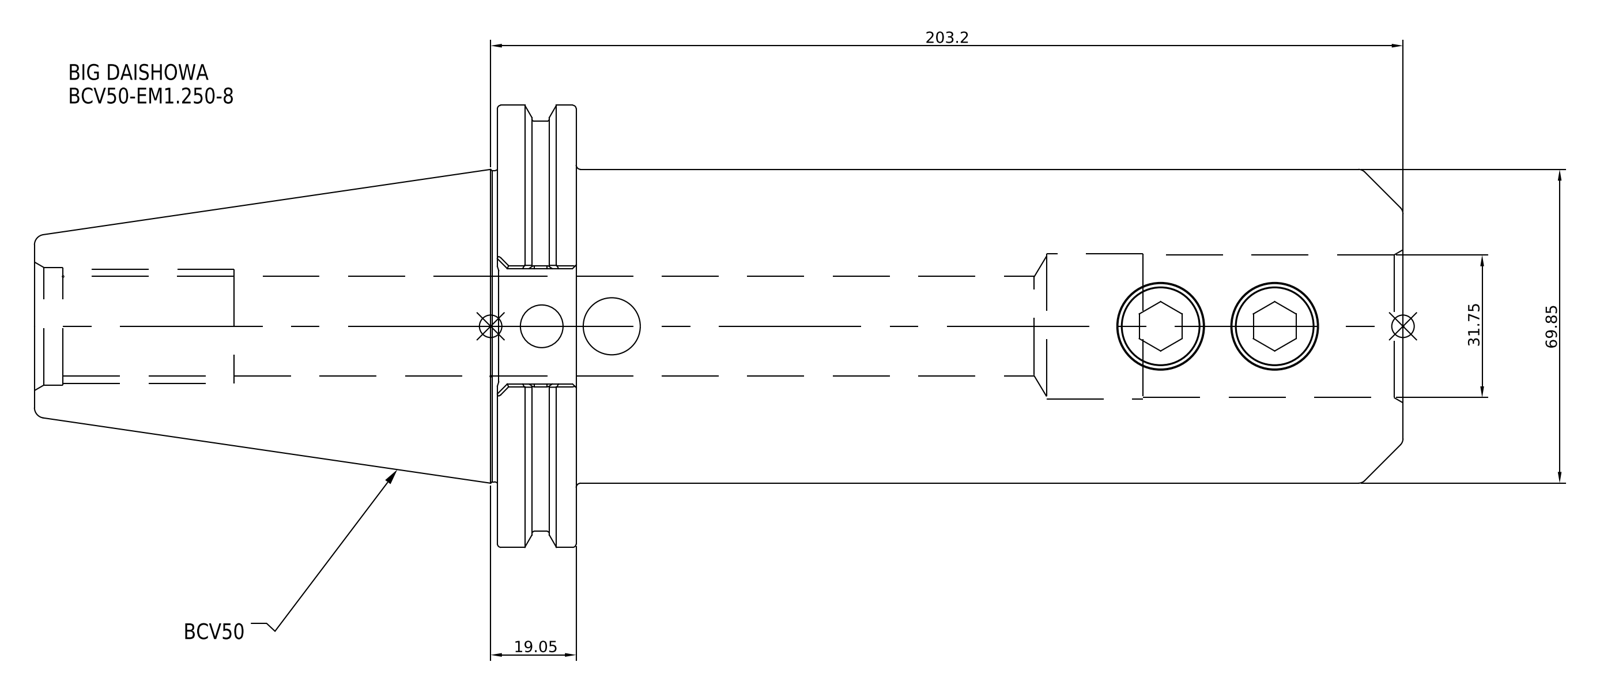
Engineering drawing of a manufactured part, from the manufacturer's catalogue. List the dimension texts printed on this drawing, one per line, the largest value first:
203.2
69.85
31.75
19.05
